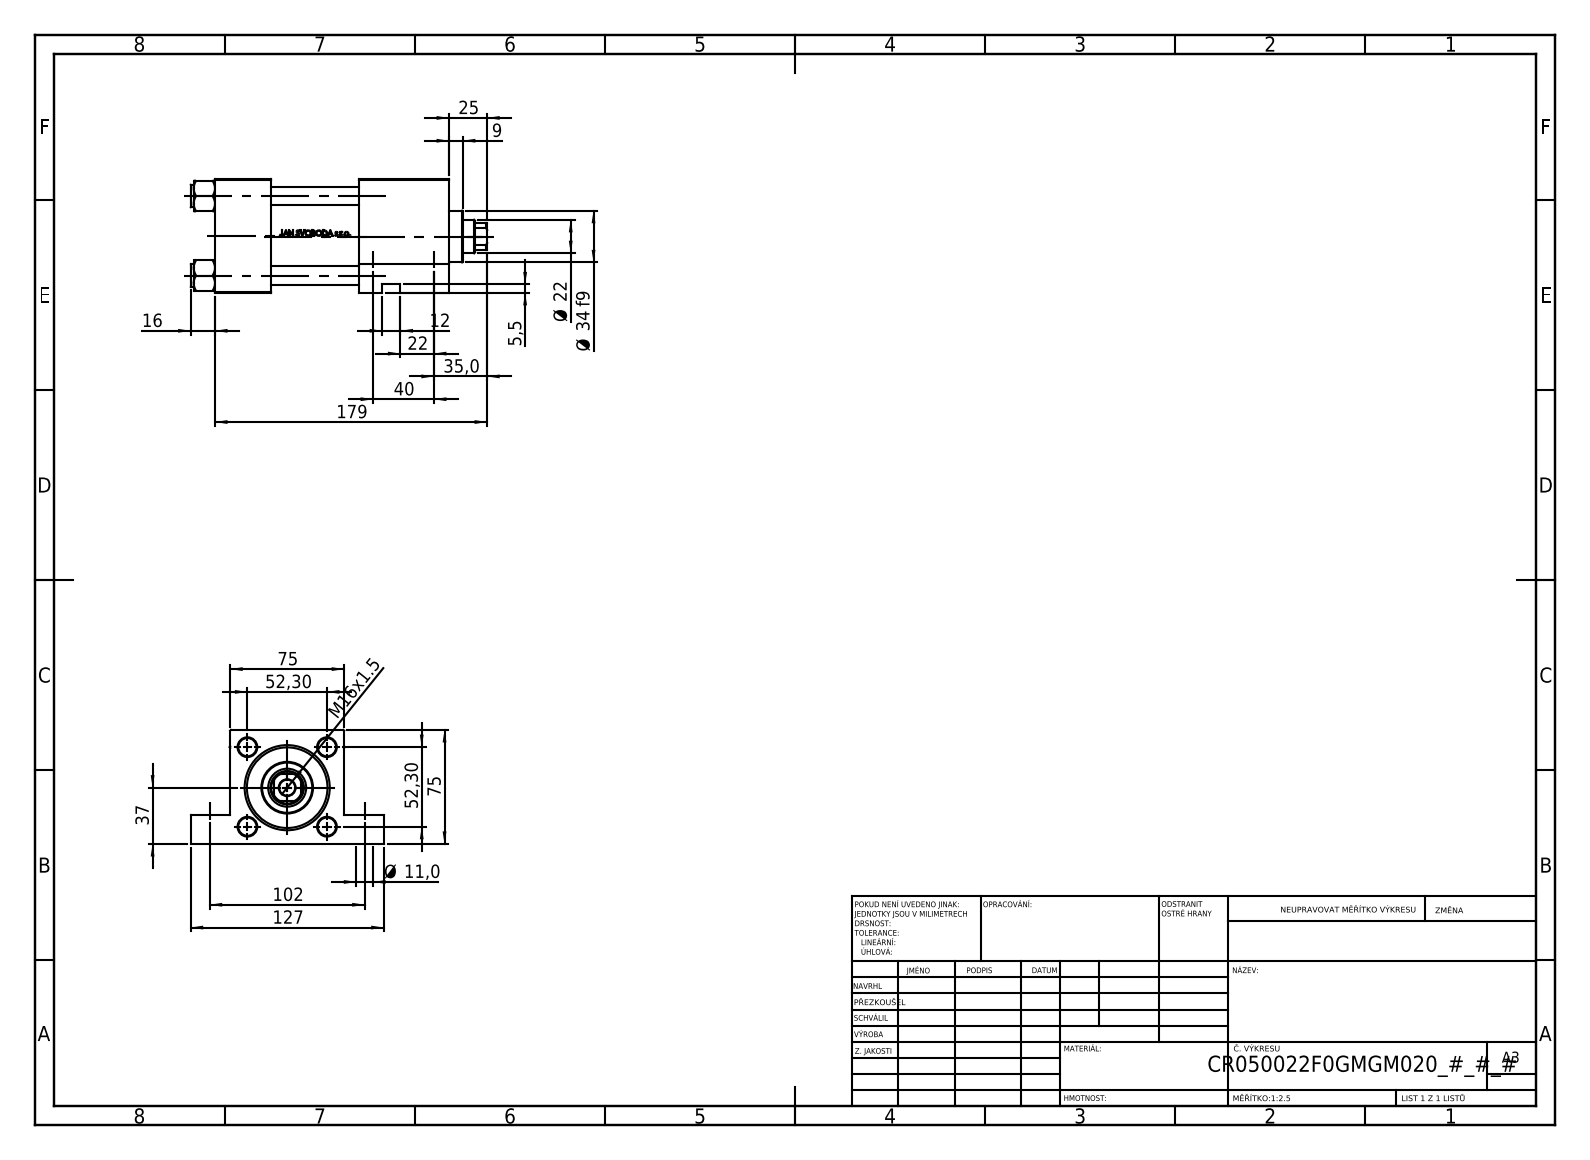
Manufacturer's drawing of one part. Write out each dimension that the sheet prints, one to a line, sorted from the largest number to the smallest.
179
127
102
75
75
52,30
52,30
40
37
35,0
Ø 34 f9
25
Ø 22
22
16
M16x1.5
12
Ø 11,0
9
5,5
